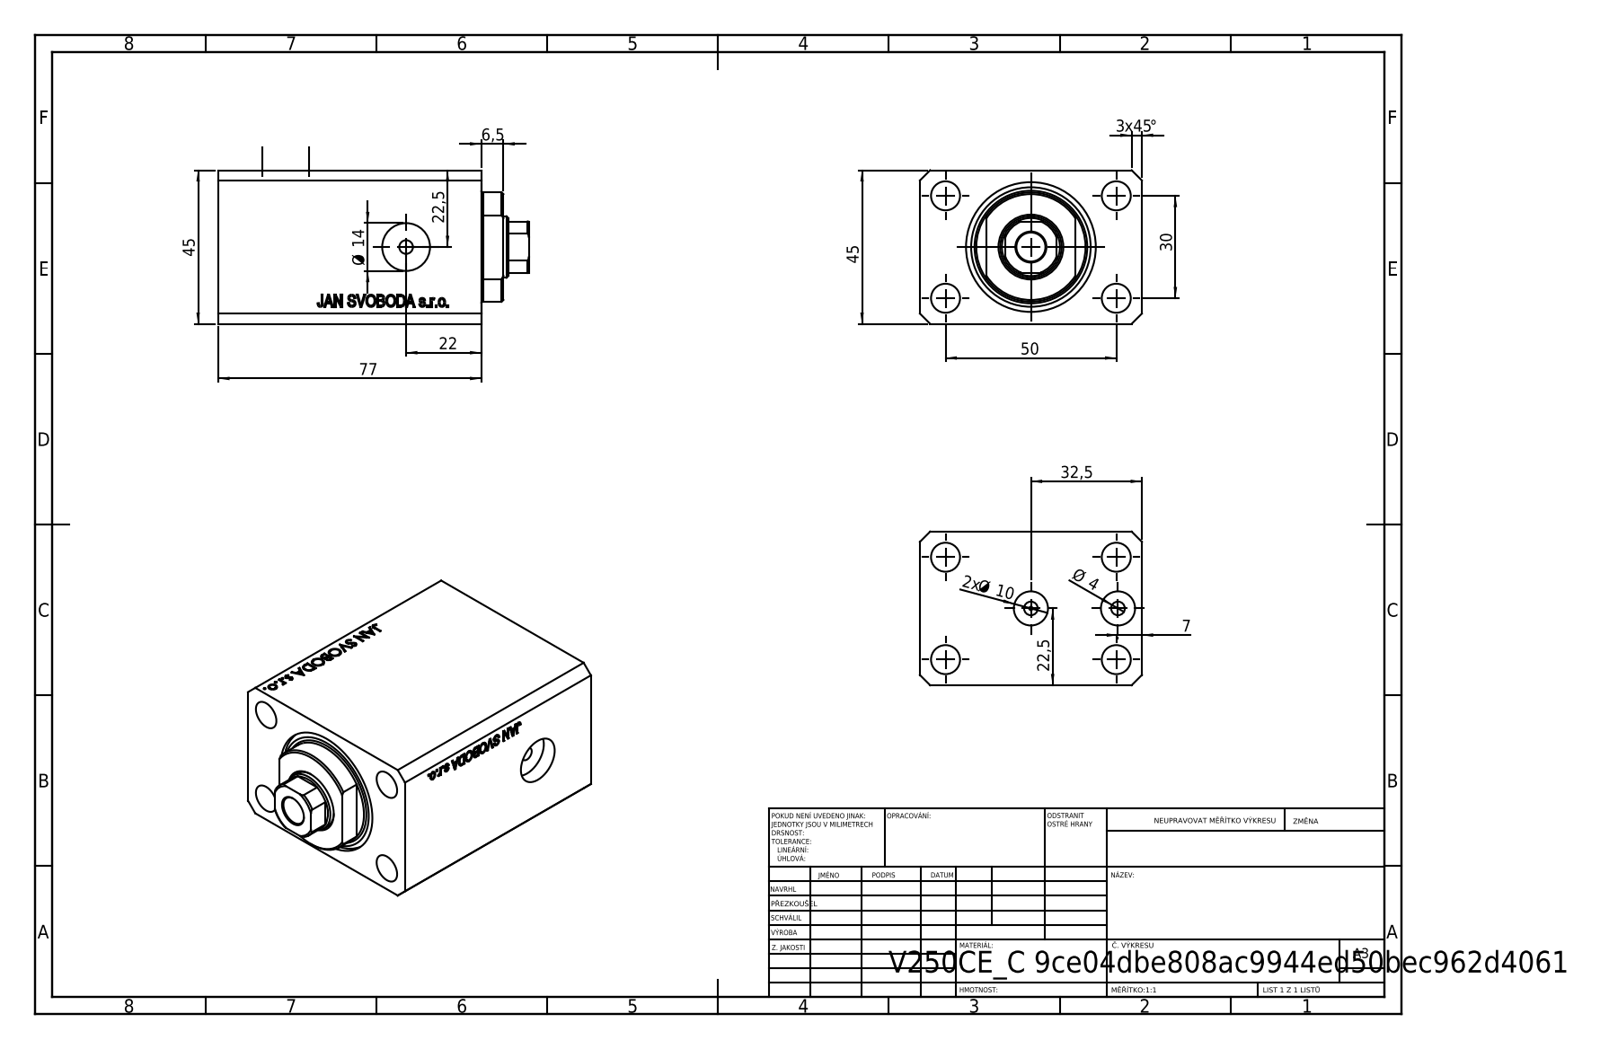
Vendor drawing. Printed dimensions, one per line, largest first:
77
50
45
3 x45 °
45
32,5
30
22,5
22,5
22
Ø 14
2x Ø 10
7
6,5
Ø 4
